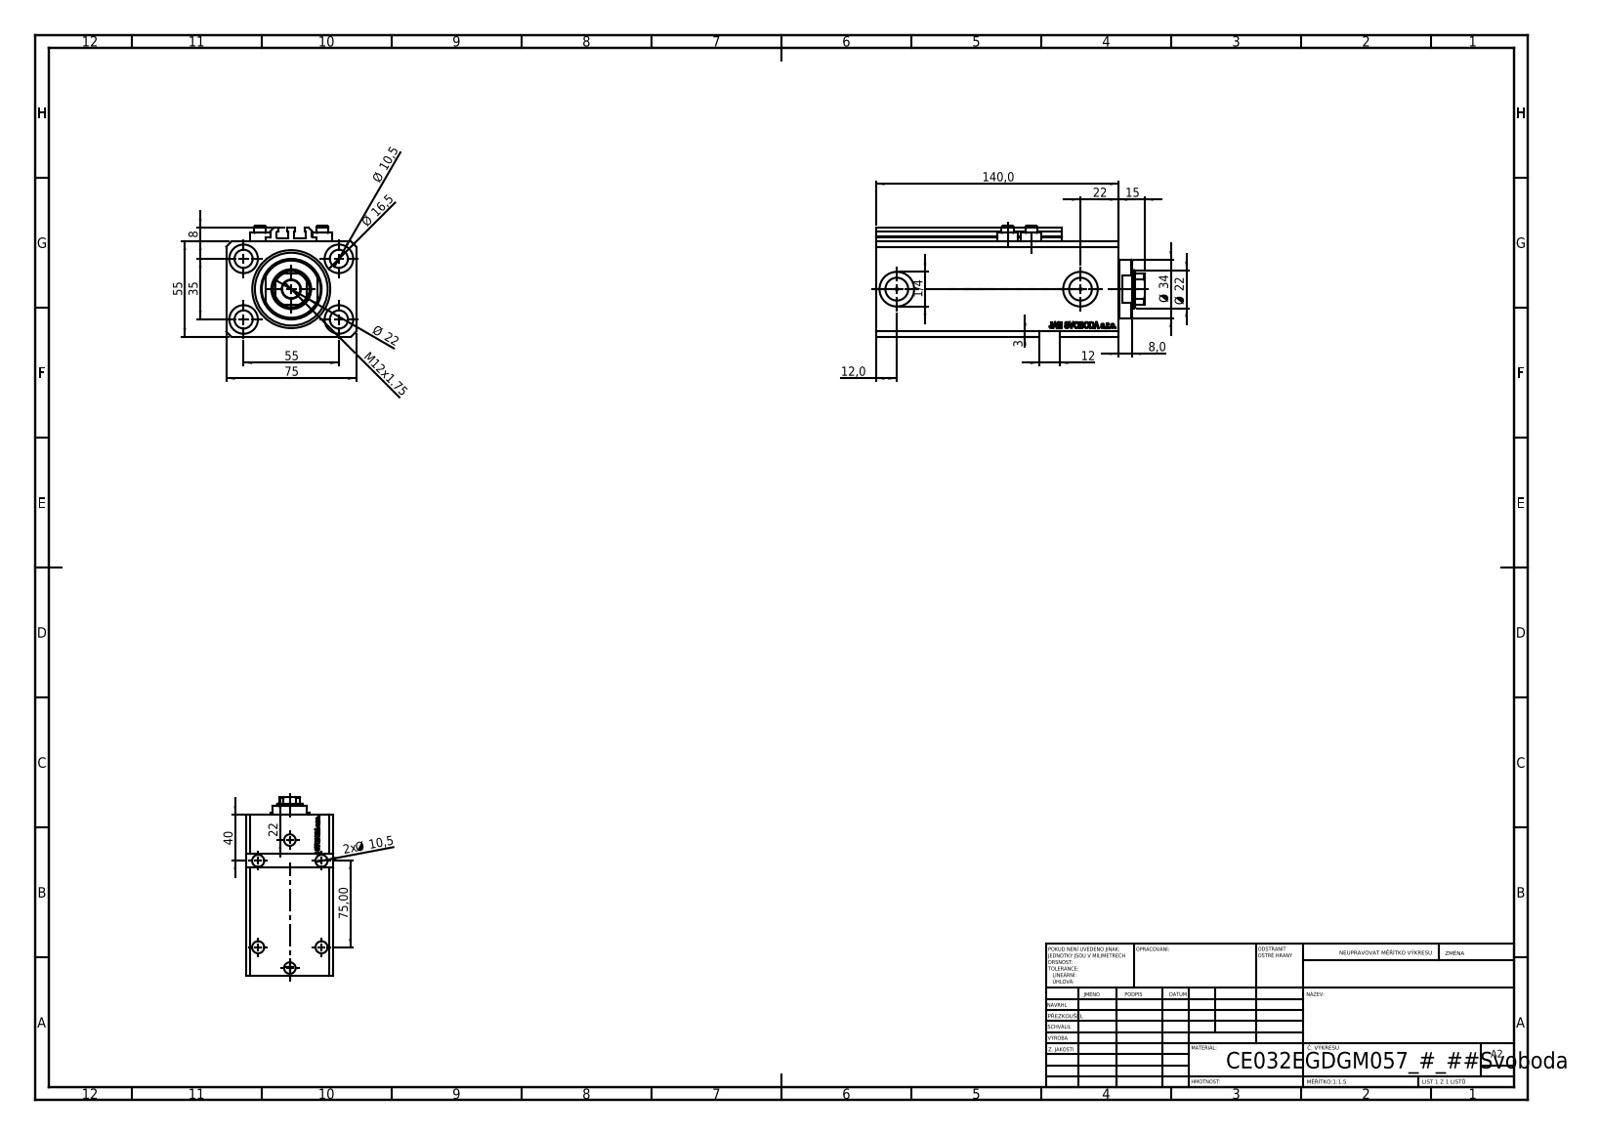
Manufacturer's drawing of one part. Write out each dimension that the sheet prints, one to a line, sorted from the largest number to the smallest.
140,0
75
75,00
55
55
40
35
Ø 34
Ø 22
22
Ø 22
22
Ø 16,5
15
M12x1.75
12,0
12
Ø 10,5
2x Ø 10,5
8
8,0
3
1/4
